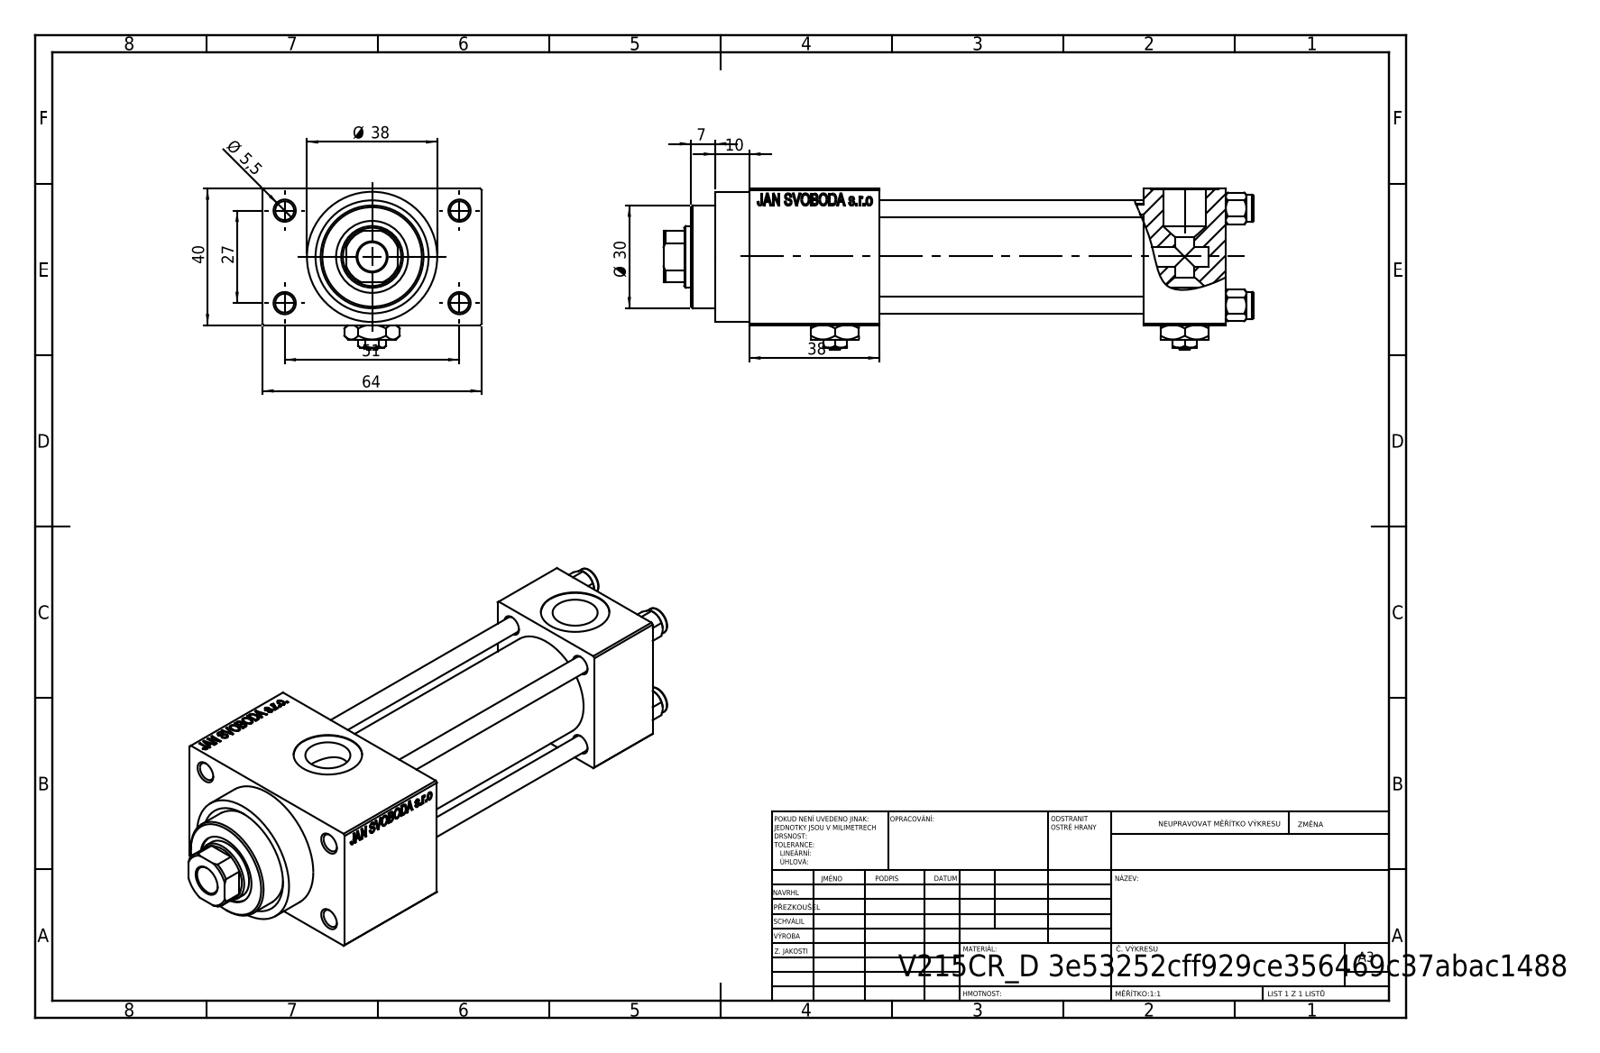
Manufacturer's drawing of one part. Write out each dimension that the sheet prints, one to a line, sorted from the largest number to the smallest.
64
51
40
38
Ø 38
Ø 30
27
10
7
Ø 5,5
